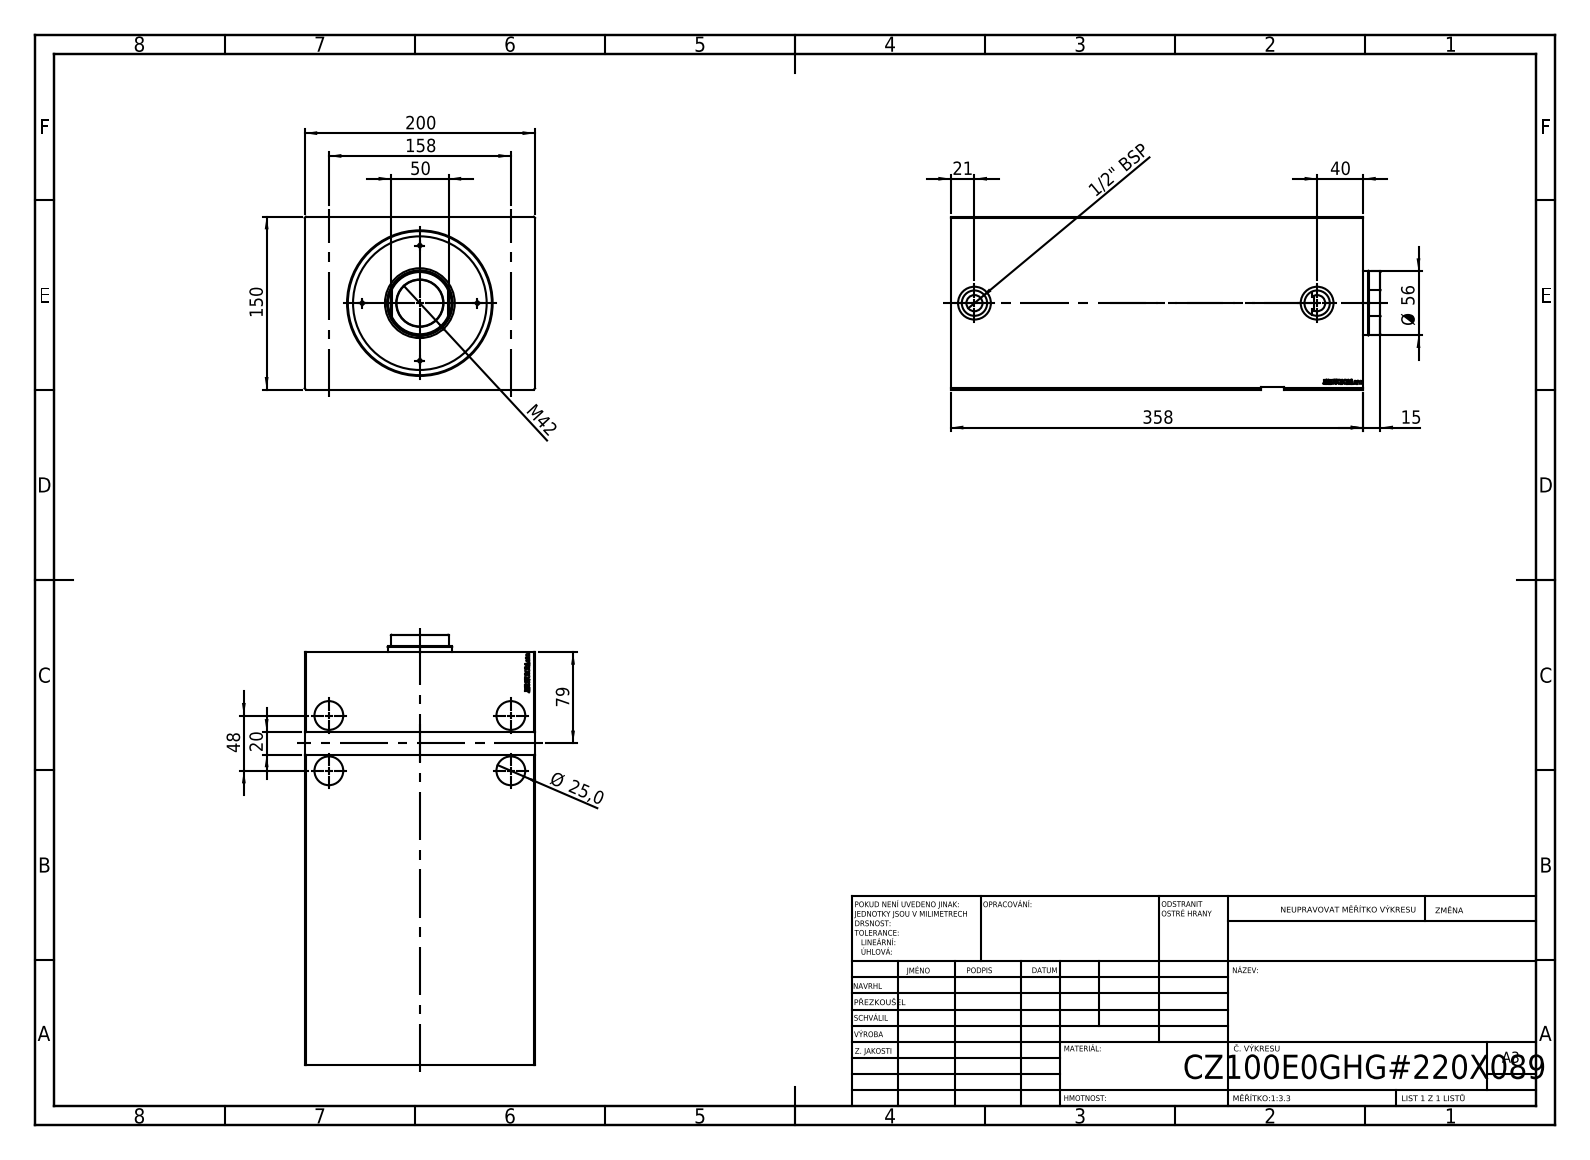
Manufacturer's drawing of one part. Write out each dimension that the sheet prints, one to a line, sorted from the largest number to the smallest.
358
200
158
150
79
Ø 56
50
48
M42
40
Ø 25,0
21
20
15
1/2" BSP
